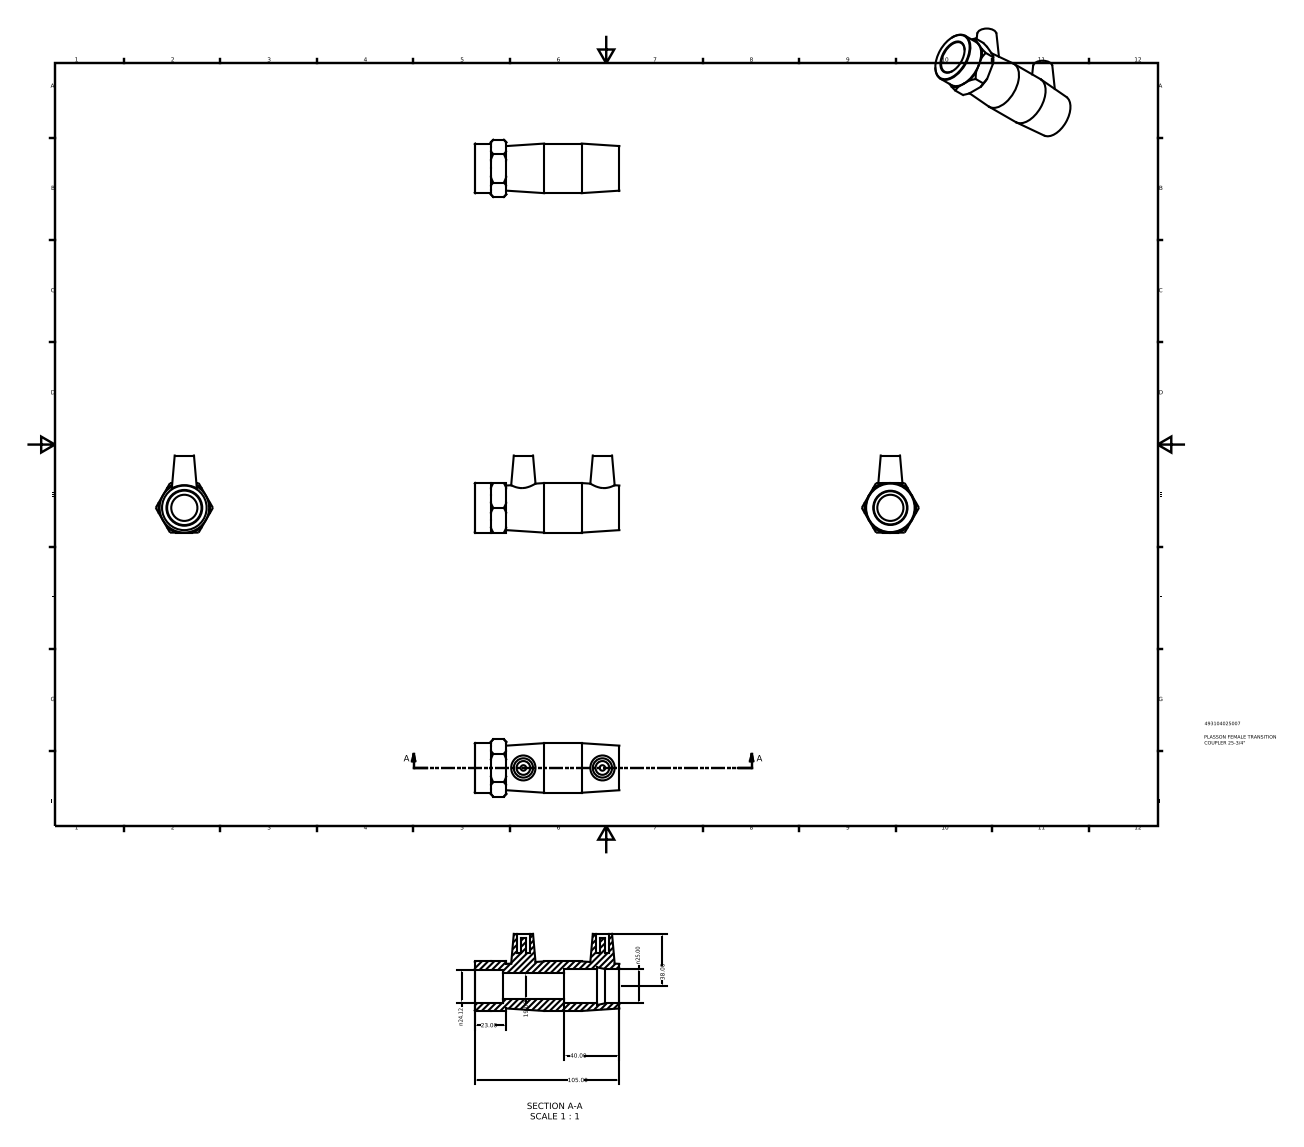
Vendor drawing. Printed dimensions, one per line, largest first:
105.00
40.00
38.00
n25.00
n24.12
23.00
19.00
